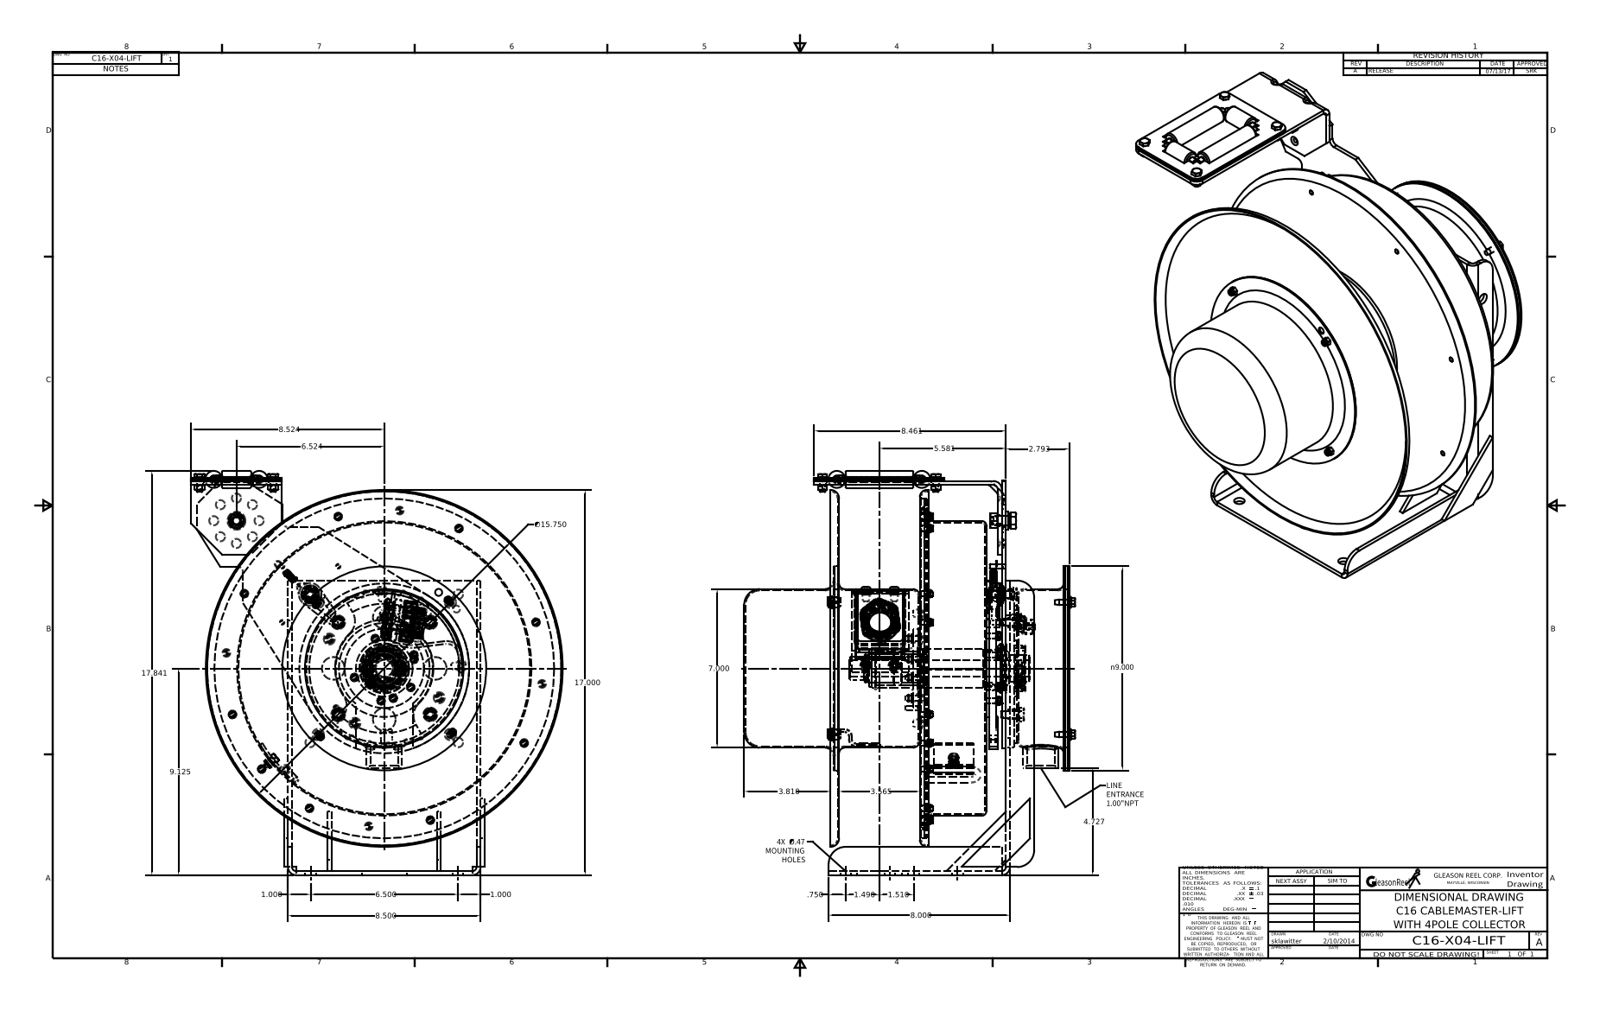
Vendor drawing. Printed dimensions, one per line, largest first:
17.841
17.000
∅15.750
9.125
n9.000
8.524
8.500
8.461
8.000
7.000
6.524
6.500
5.581
4.727
3.810
3.565
2.793
1.510
1.490
1.000
1.000
.750
